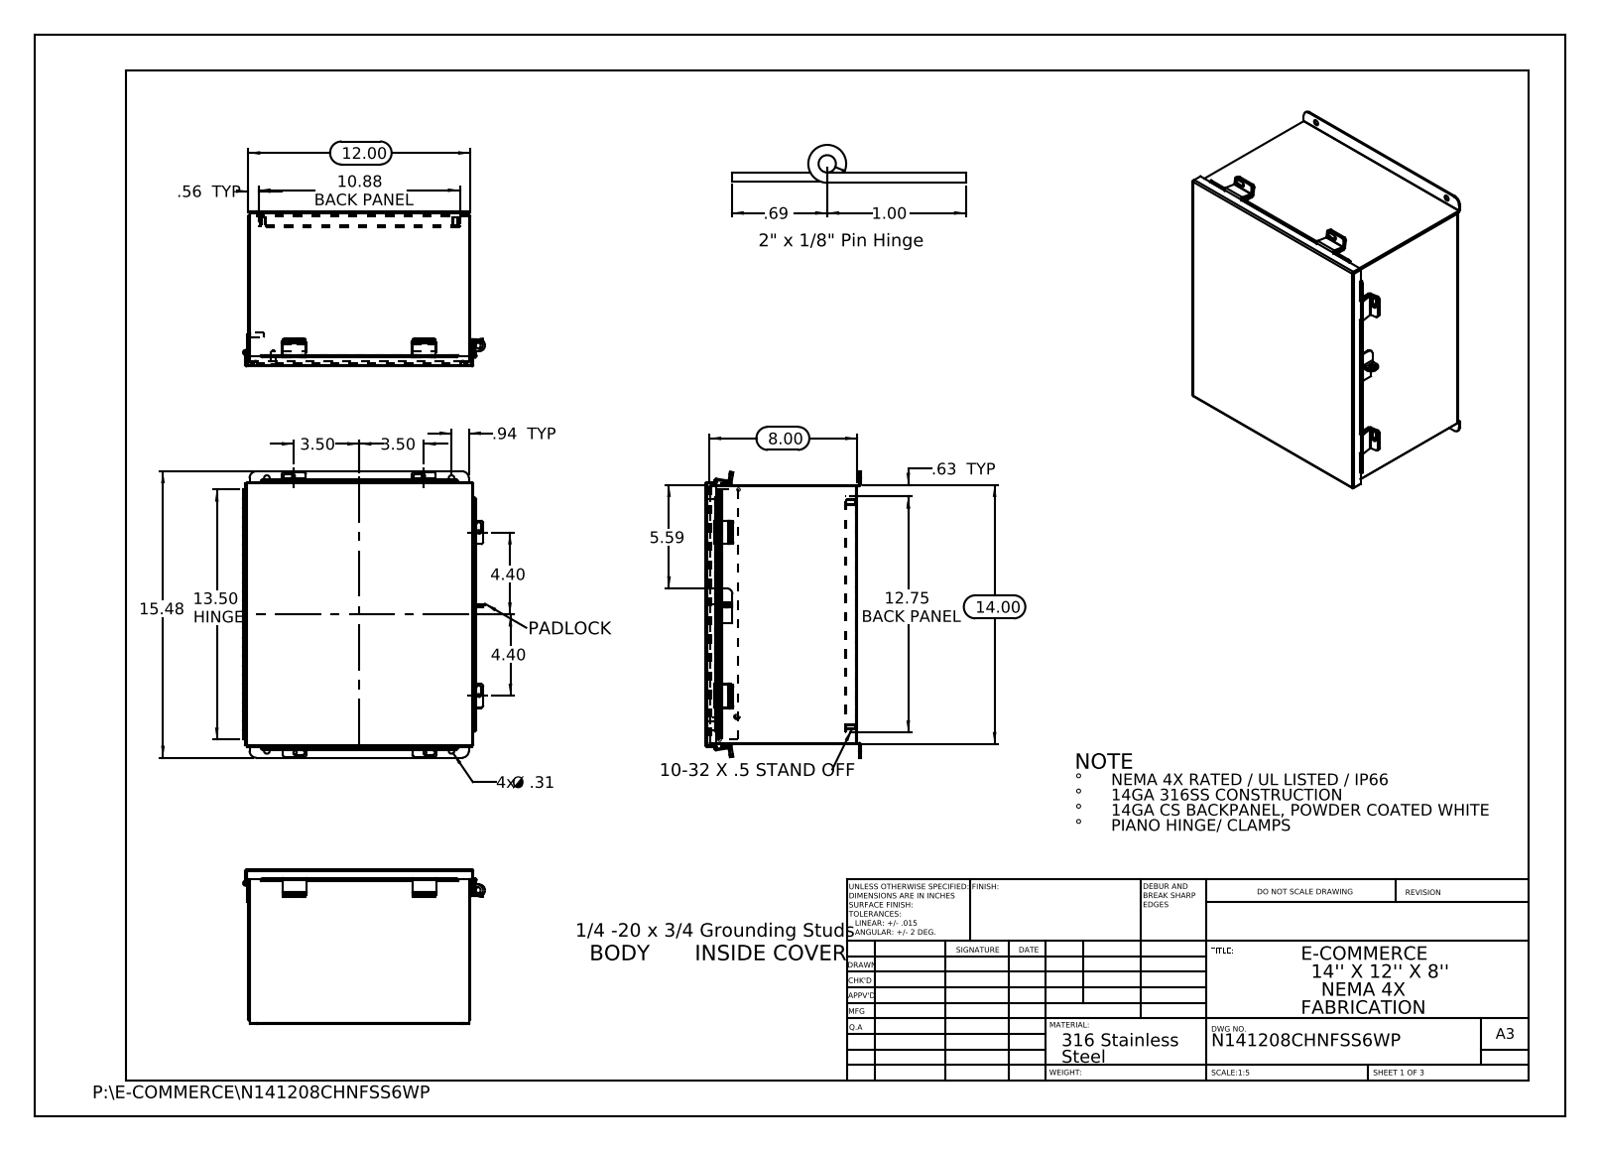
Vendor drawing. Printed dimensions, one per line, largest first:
15.48
14.00
13.50 HINGE
12.75 BACK PANEL
12.00
10.88 BACK PANEL
8.00
5.59
4.40
4.40
3.50
3.50
1.00
.94 TYP
.69
.63 TYP
.56 TYP
4x Ø .31
